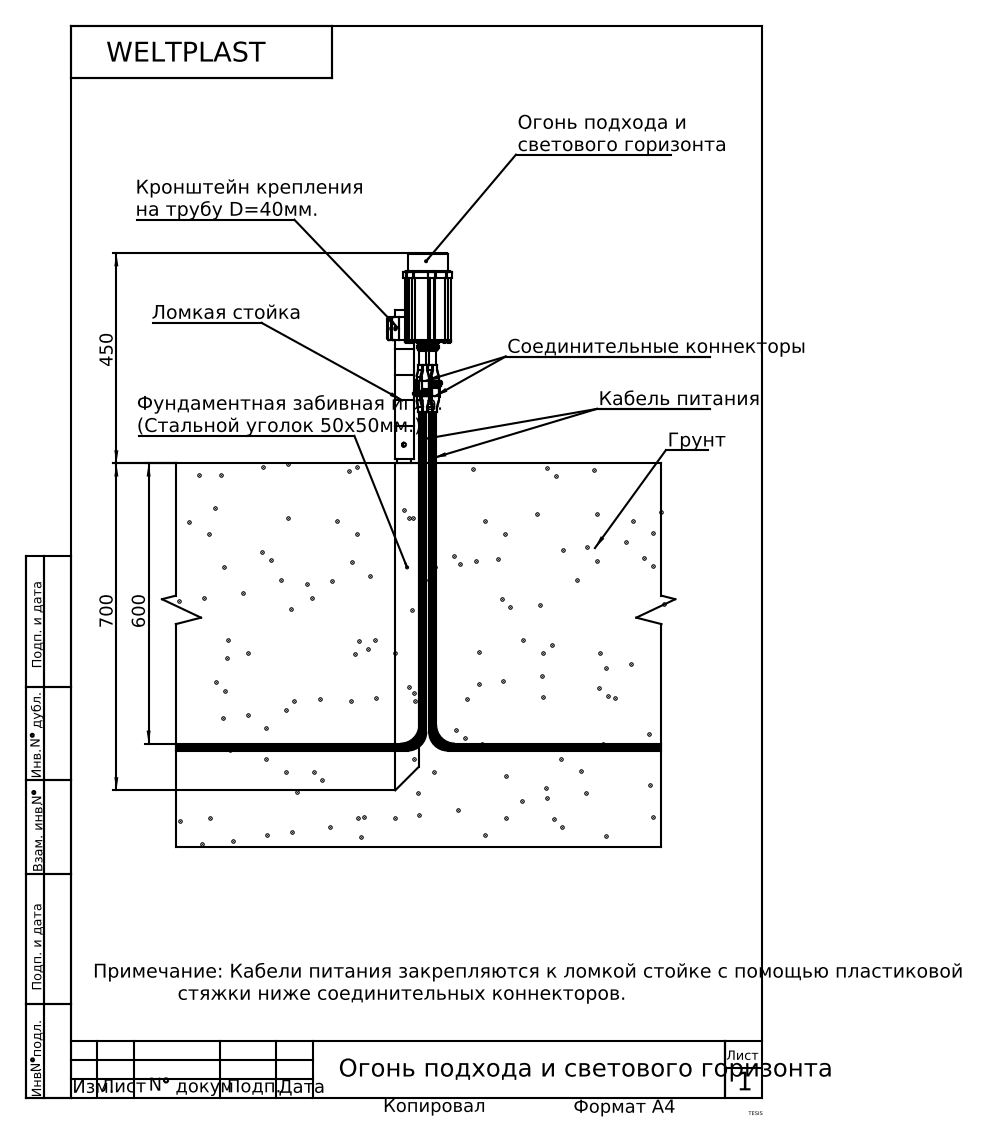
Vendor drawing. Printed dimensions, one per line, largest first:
700
600
450
